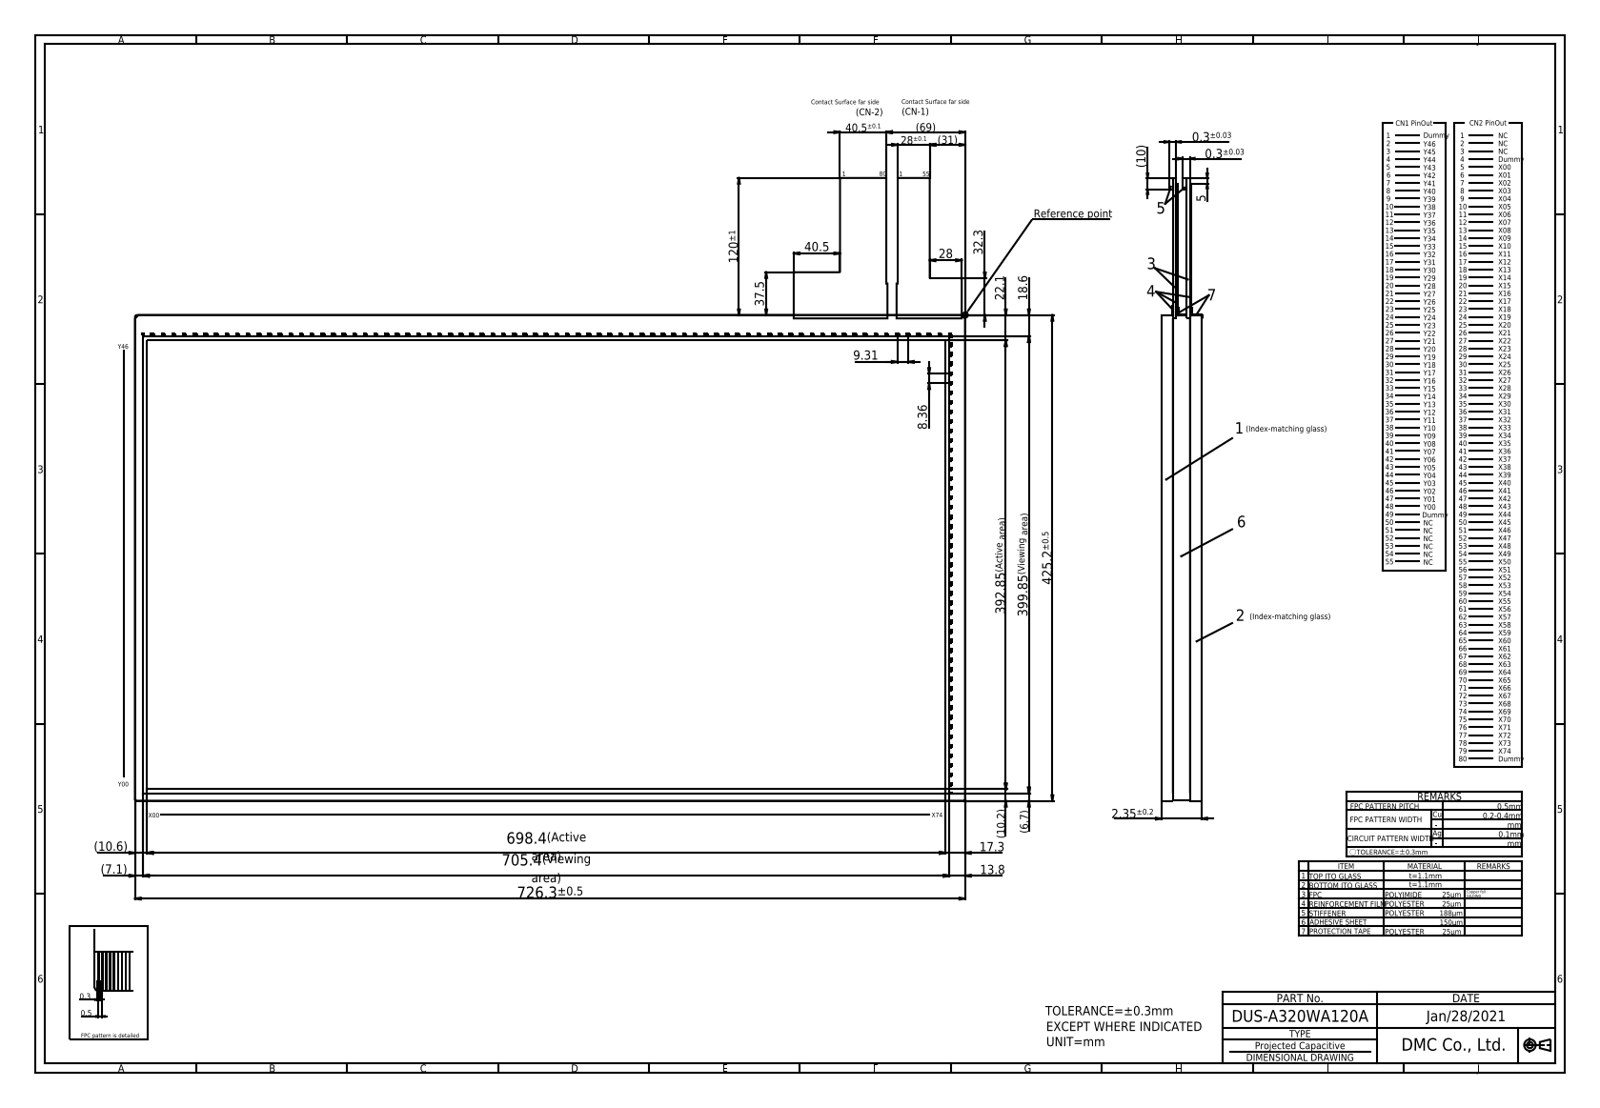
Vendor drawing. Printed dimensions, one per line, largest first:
726.3±0.5
705.4(Viewing area)
698.4(Active area)
425.2±0.5
399.85(Viewing area)
392.85(Active area)
120±1
(69)
40.5
40.5±0.1
37.5
32.3
(31)
28
28±0.1
22.1
18.6
17.3
13.8
(10.6)
(10.2)
(10)
9.31
8.36
(7.1)
(6.7)
5
2.35±0.2
0.5
0.3
0.3±0.03
0.3±0.03
